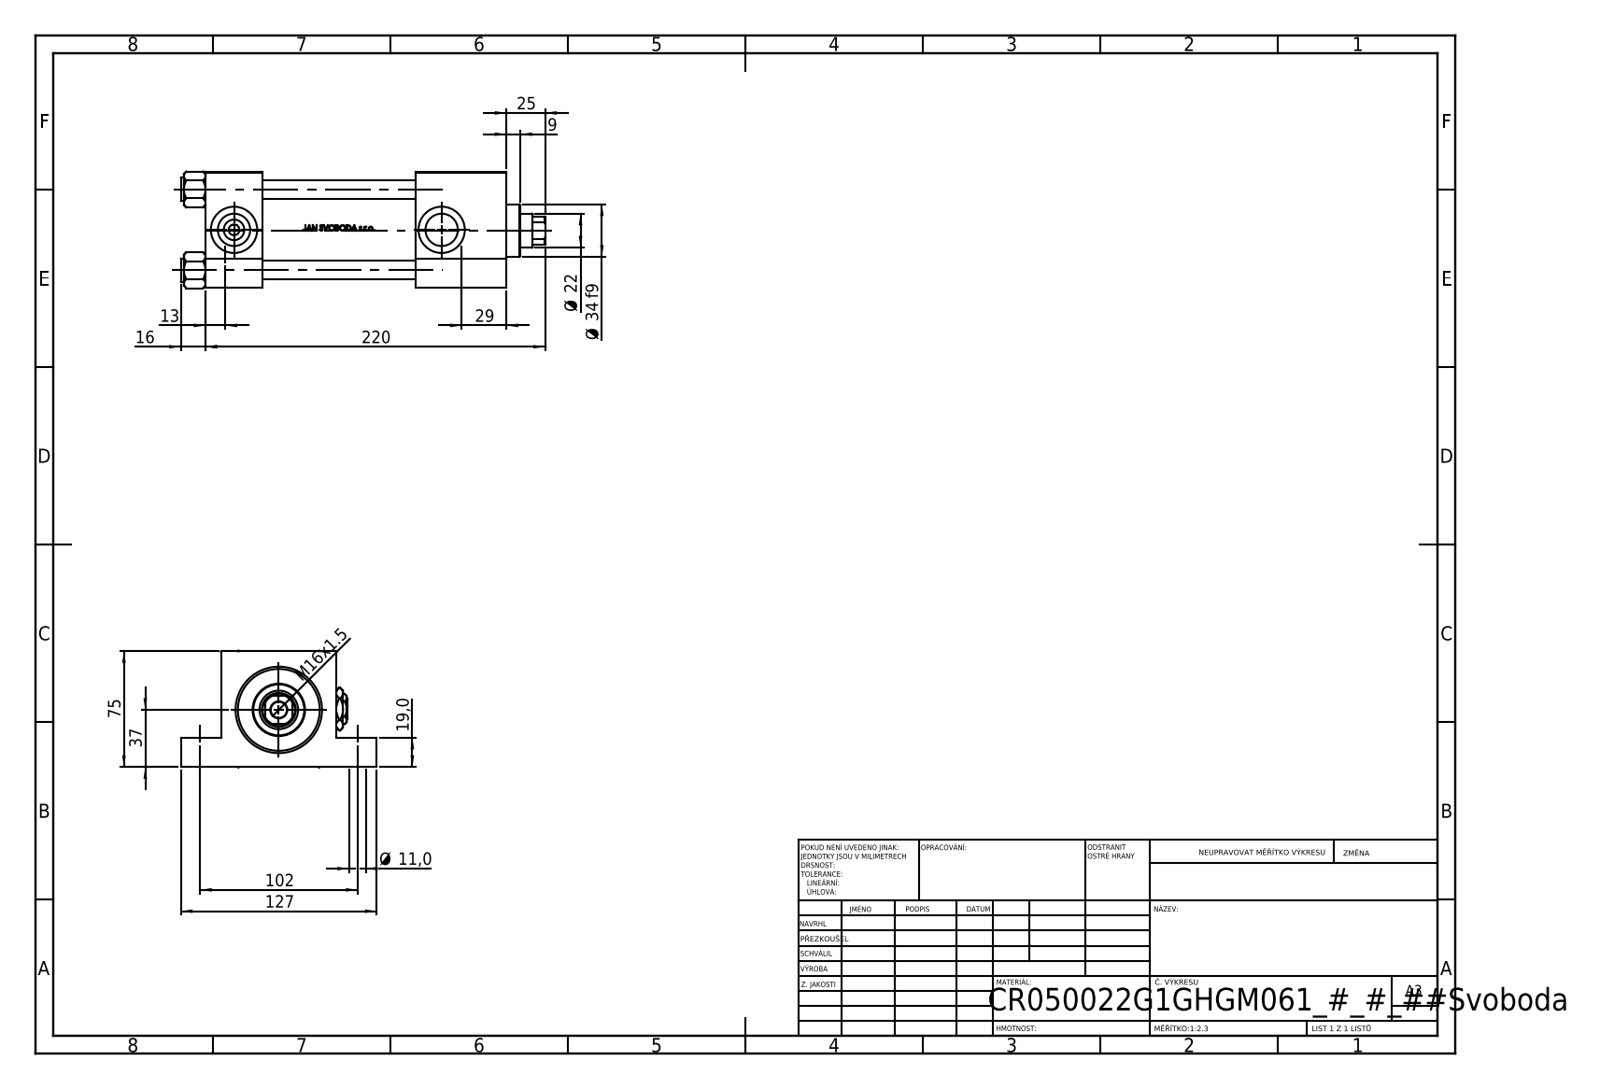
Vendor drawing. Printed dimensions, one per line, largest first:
220
127
102
75
37
Ø 34 f9
29
25
Ø 22
19,0
16
M16x1.5
13
Ø 11,0
9
